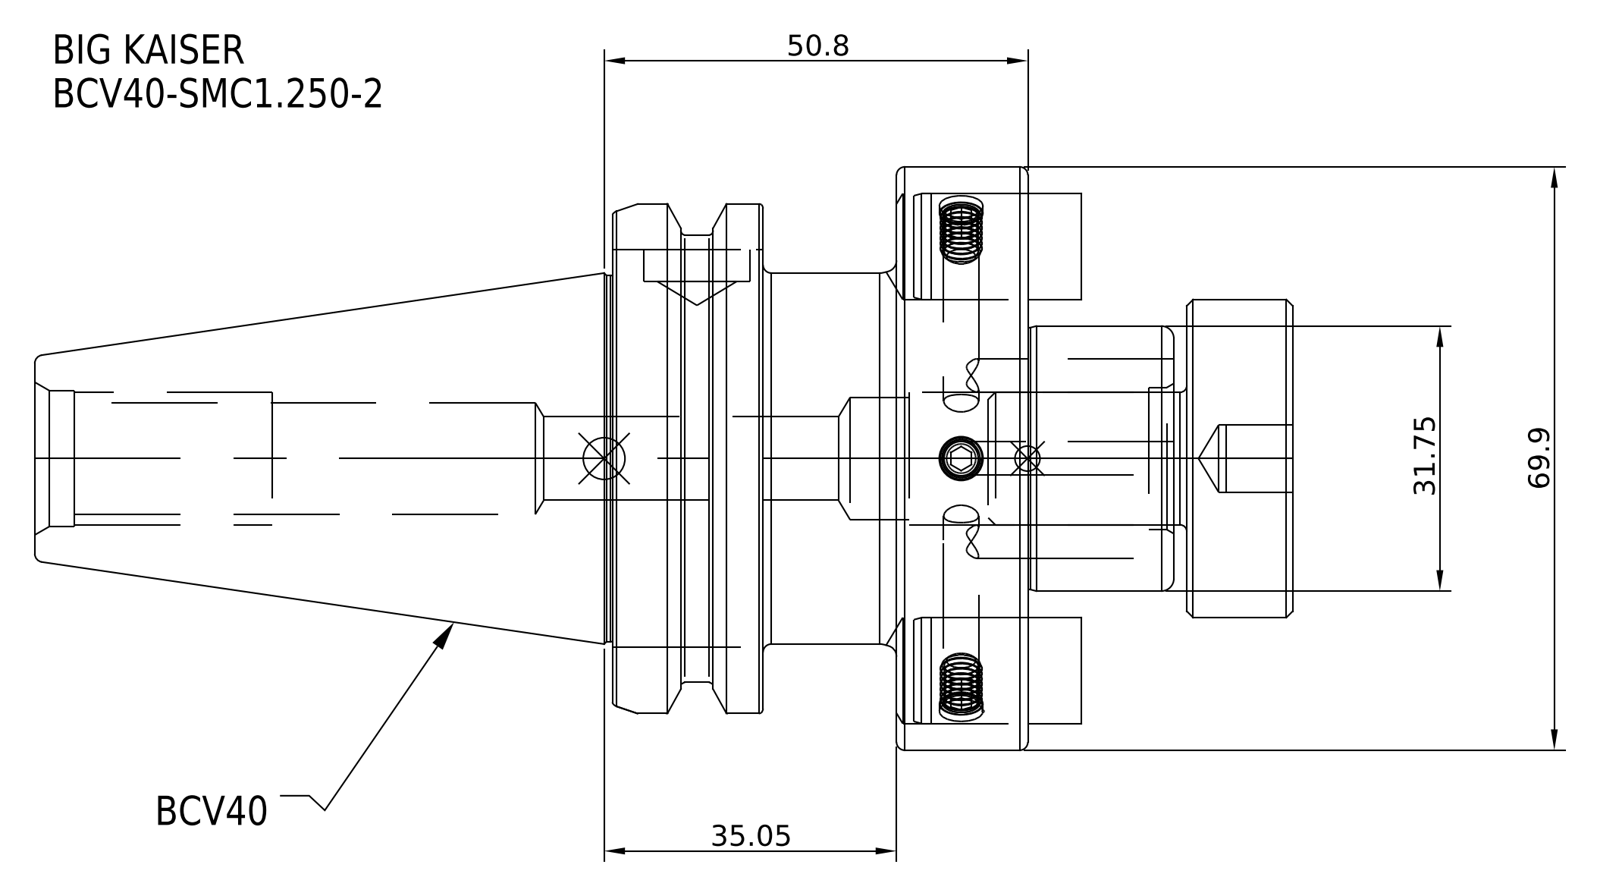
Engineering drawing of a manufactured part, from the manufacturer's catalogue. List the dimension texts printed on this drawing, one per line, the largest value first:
69.9
50.8
35.05
31.75
